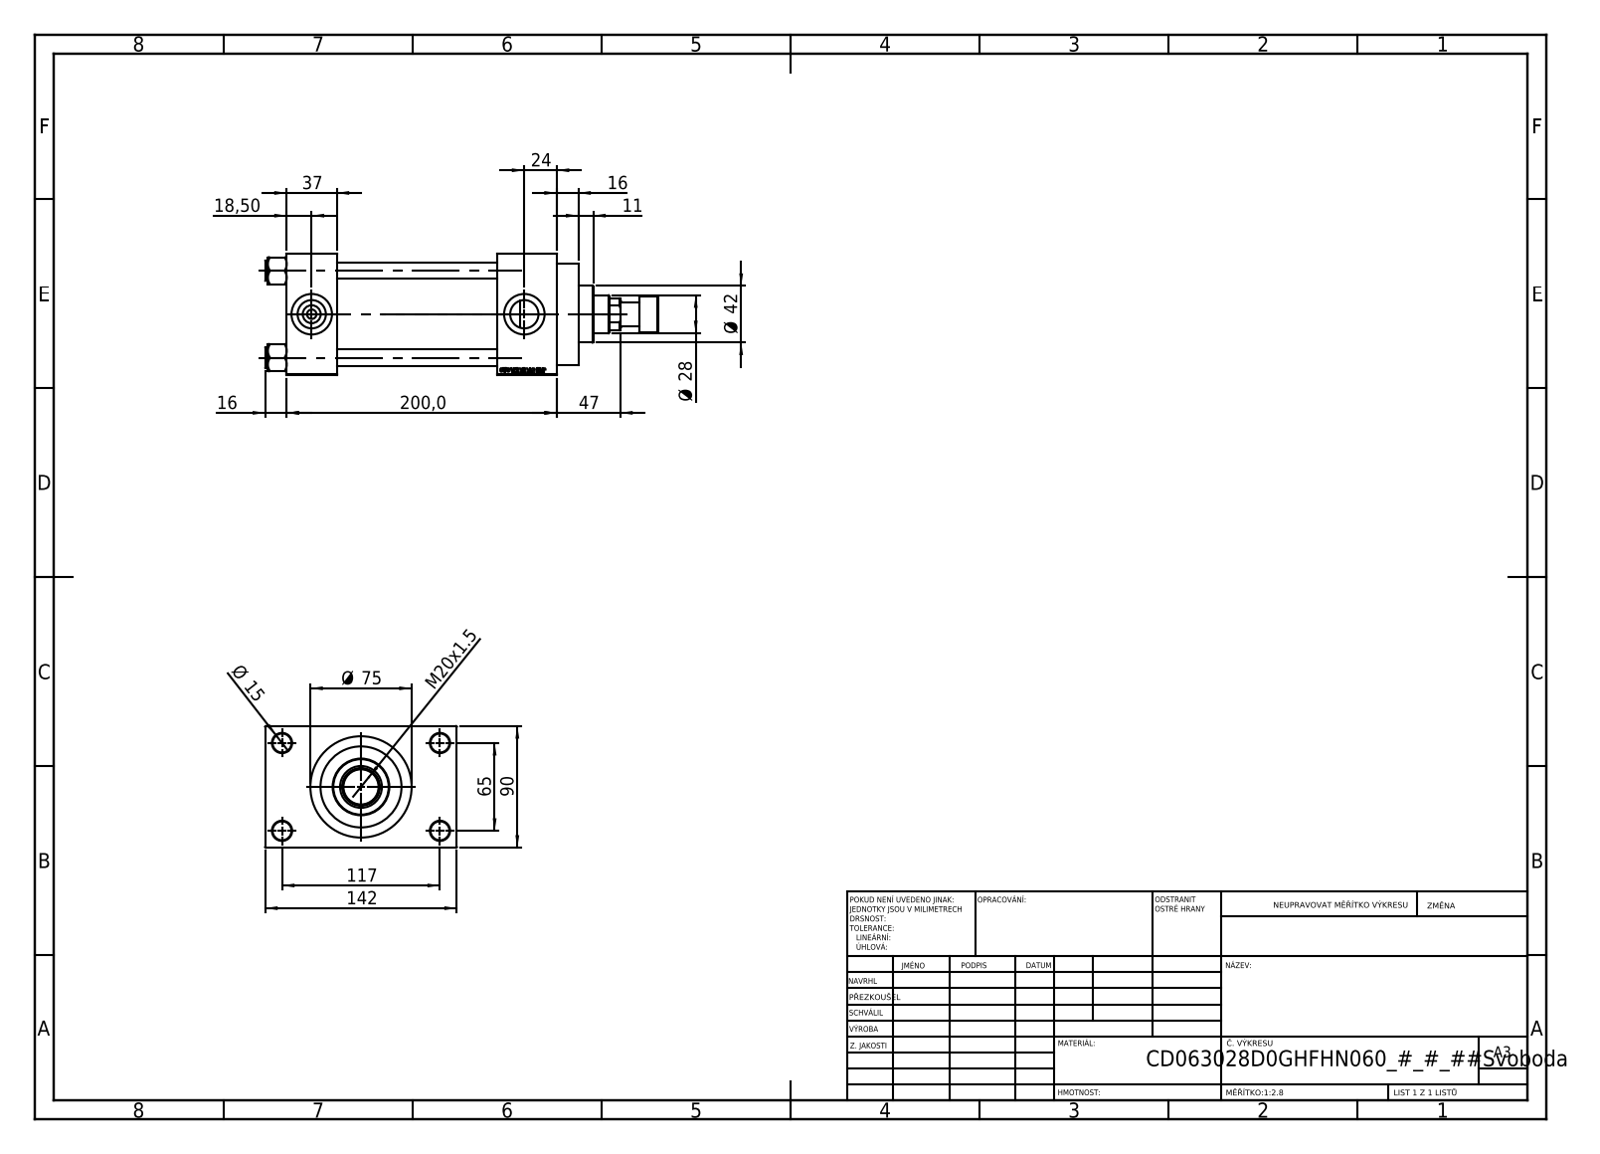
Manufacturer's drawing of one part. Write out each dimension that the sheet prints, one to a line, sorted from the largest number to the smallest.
200,0
142
117
90
Ø 75
65
47
Ø 42
37
Ø 28
24
M20x1.5
18,50
16
16
Ø 15
11
